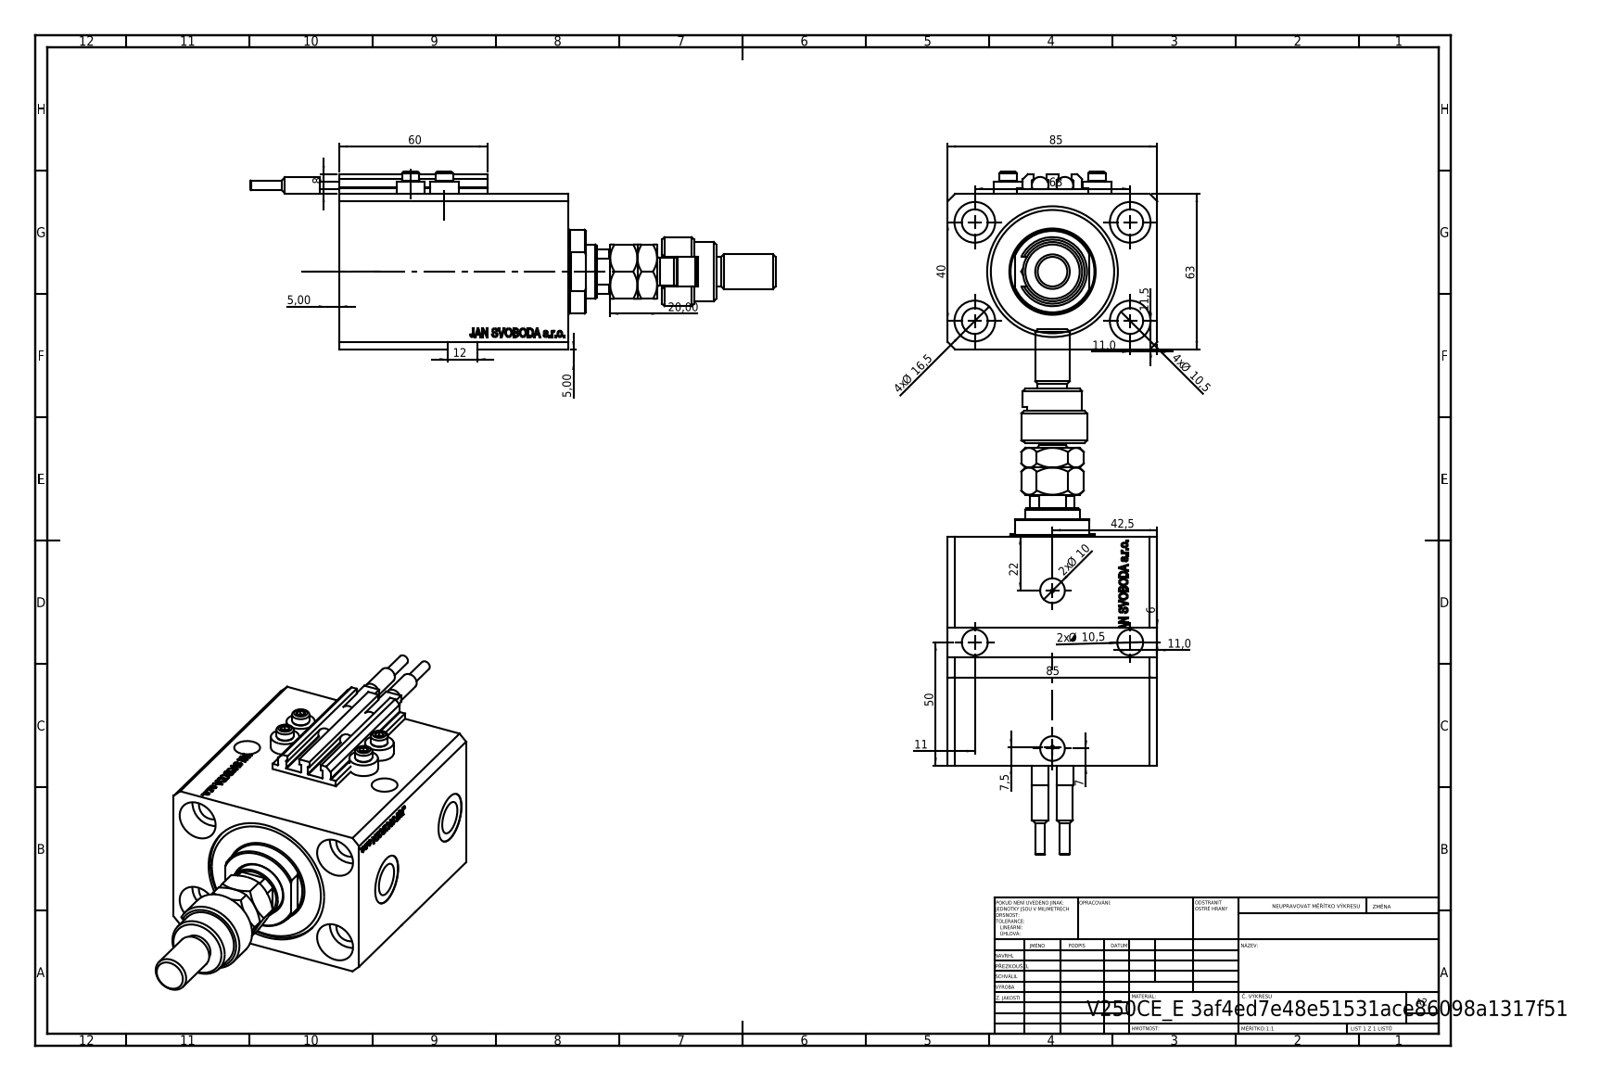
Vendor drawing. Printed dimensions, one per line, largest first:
85
85
63
63
60
50
42,5
40
22
20,00
4x Ø 16,5
12
11,5
11,0
11,0
11
4x Ø 10,5
2x Ø 10,5
2x Ø 10
8
7,5
7
6
5,00
5,00
